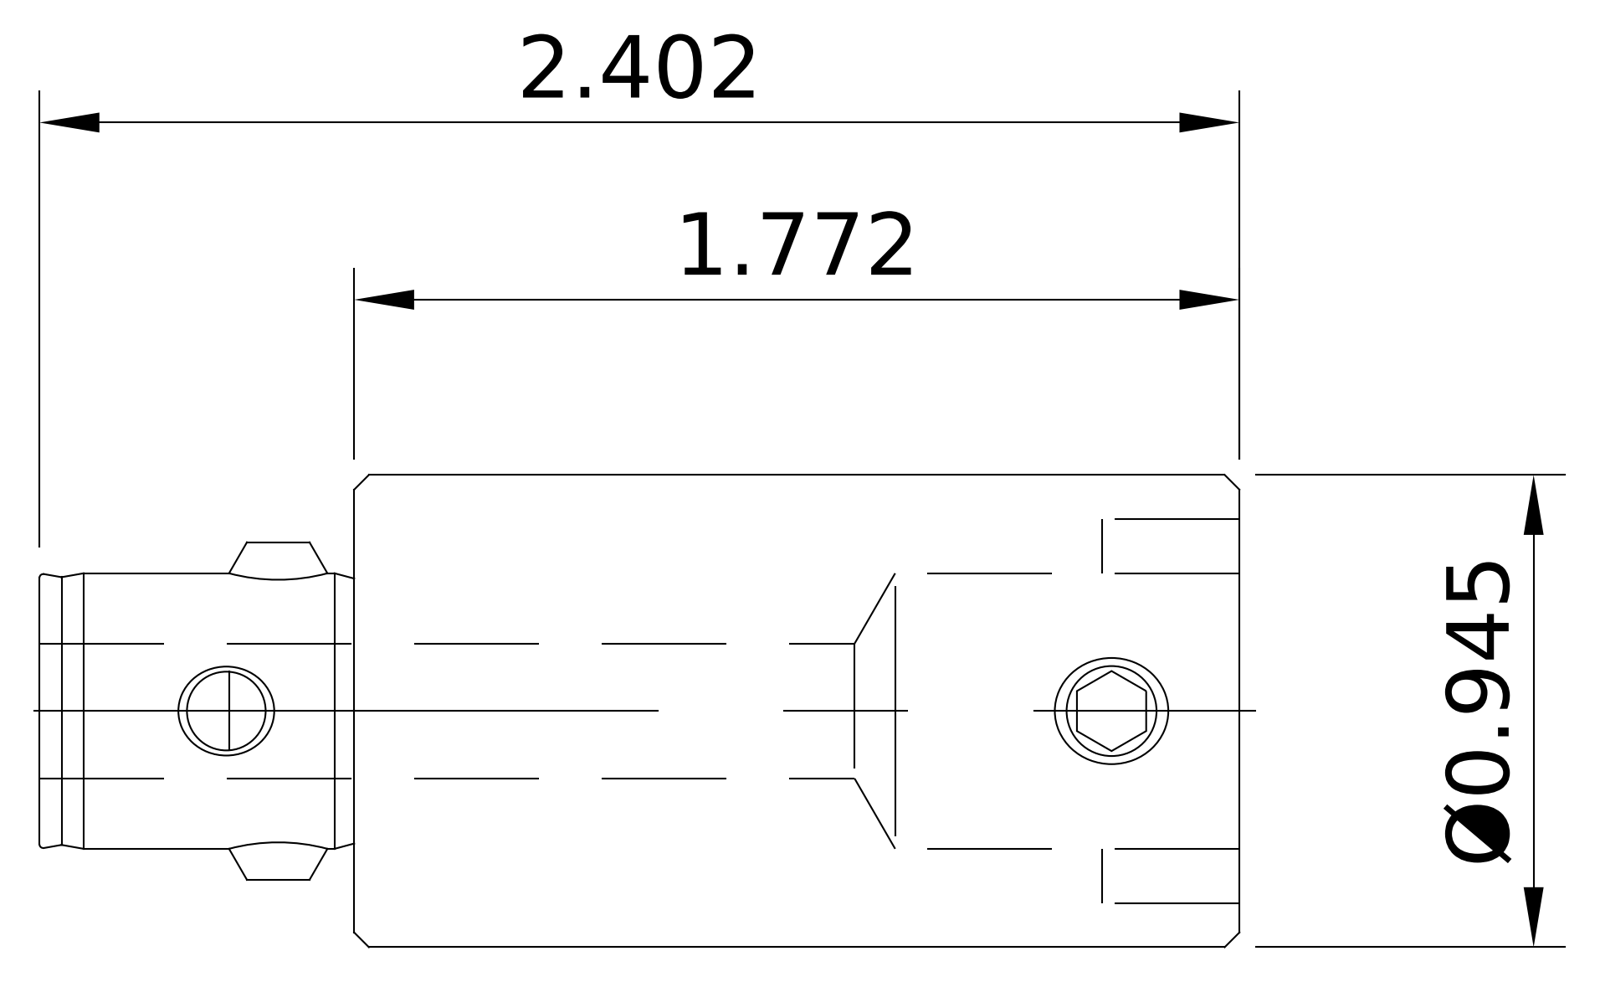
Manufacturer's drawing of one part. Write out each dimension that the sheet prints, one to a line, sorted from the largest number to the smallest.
2.402
1.772
Ø0.945
